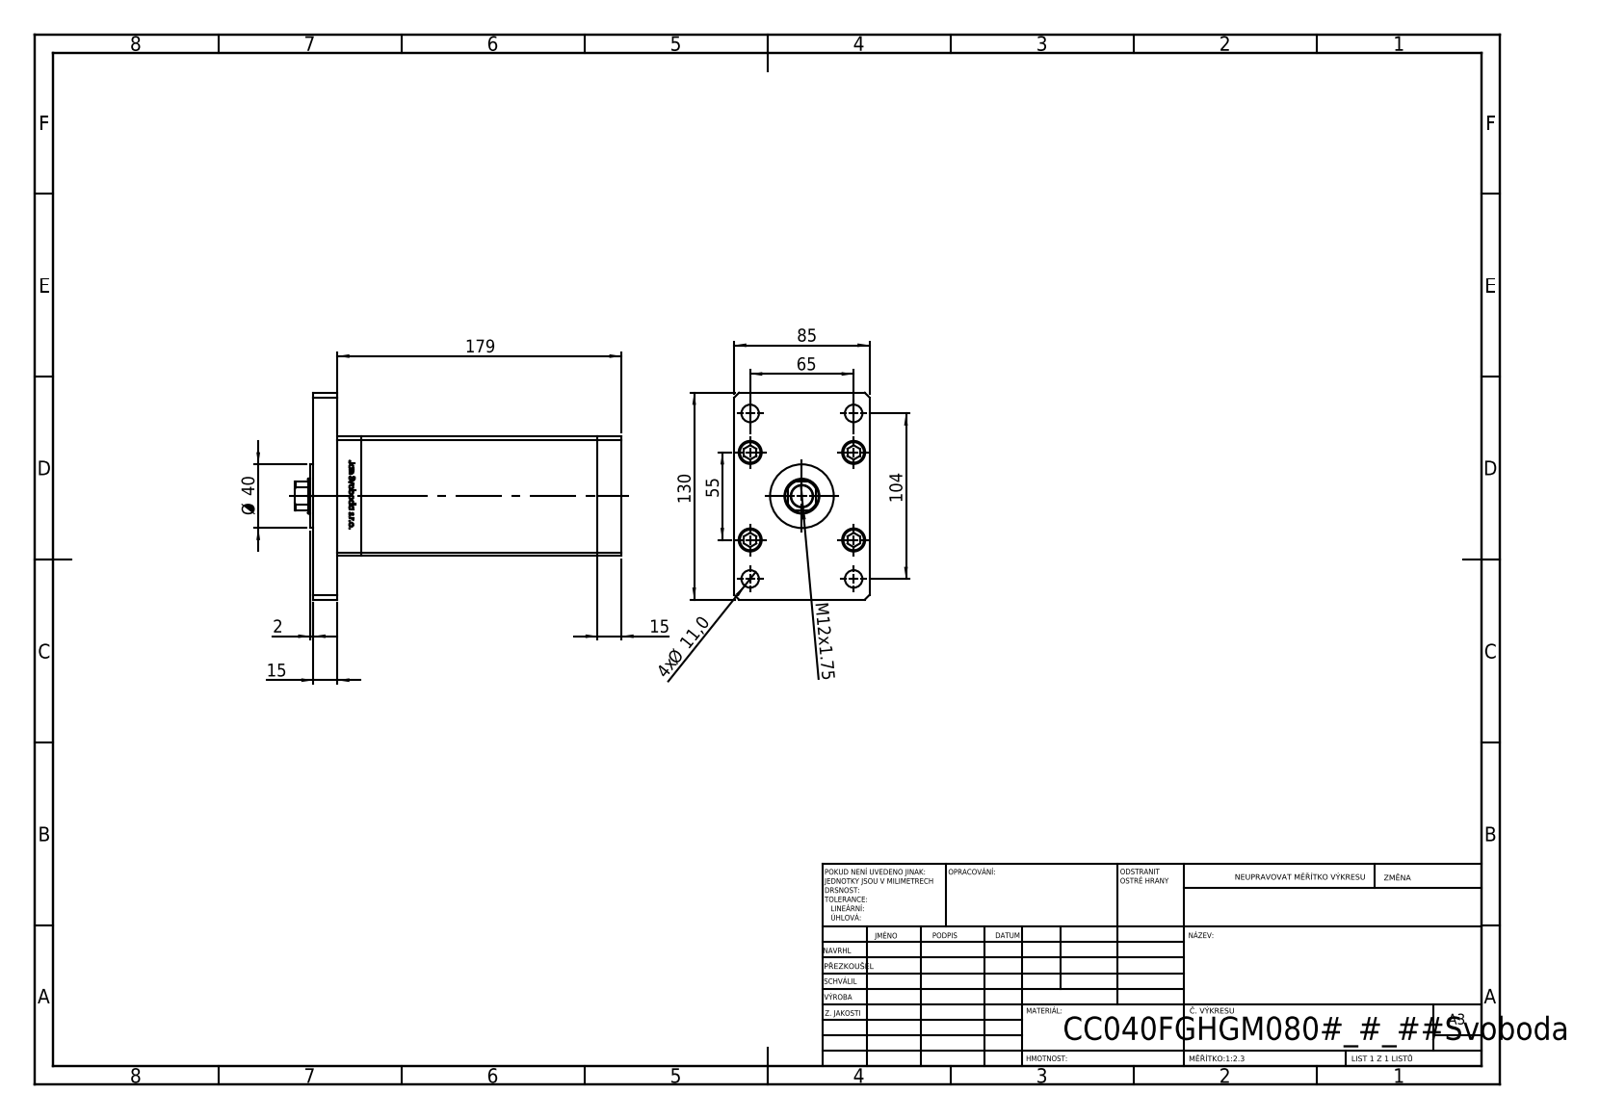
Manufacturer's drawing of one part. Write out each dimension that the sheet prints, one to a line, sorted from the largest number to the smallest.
179
130
104
85
65
55
Ø 40
15
15
M12x1.75
4x Ø 11,0
2
